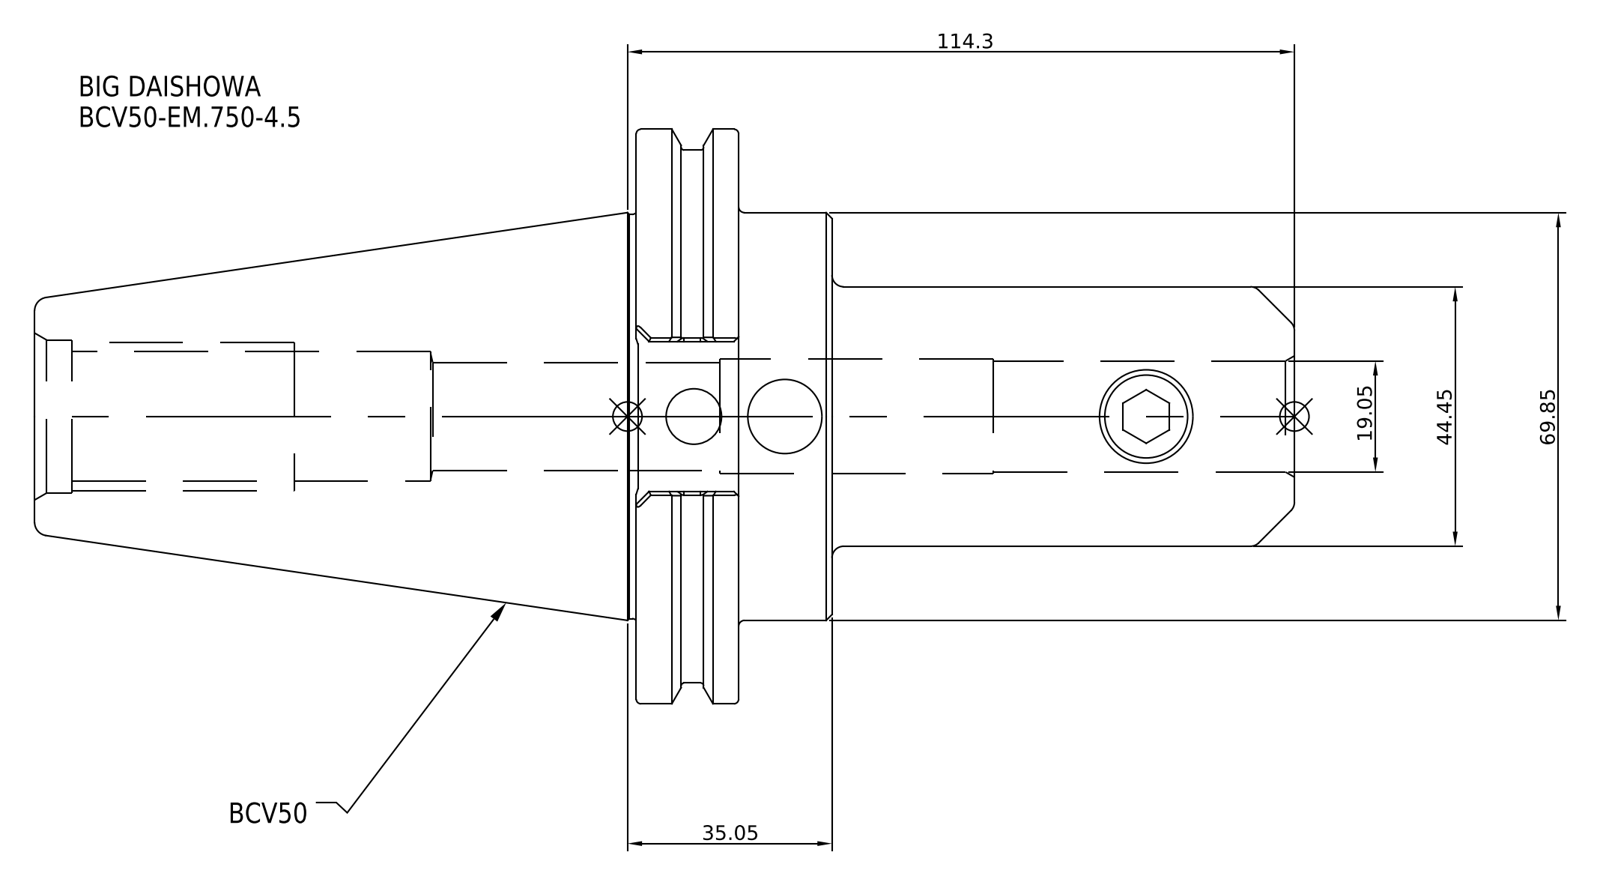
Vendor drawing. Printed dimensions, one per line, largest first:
114.3
69.85
44.45
35.05
19.05
